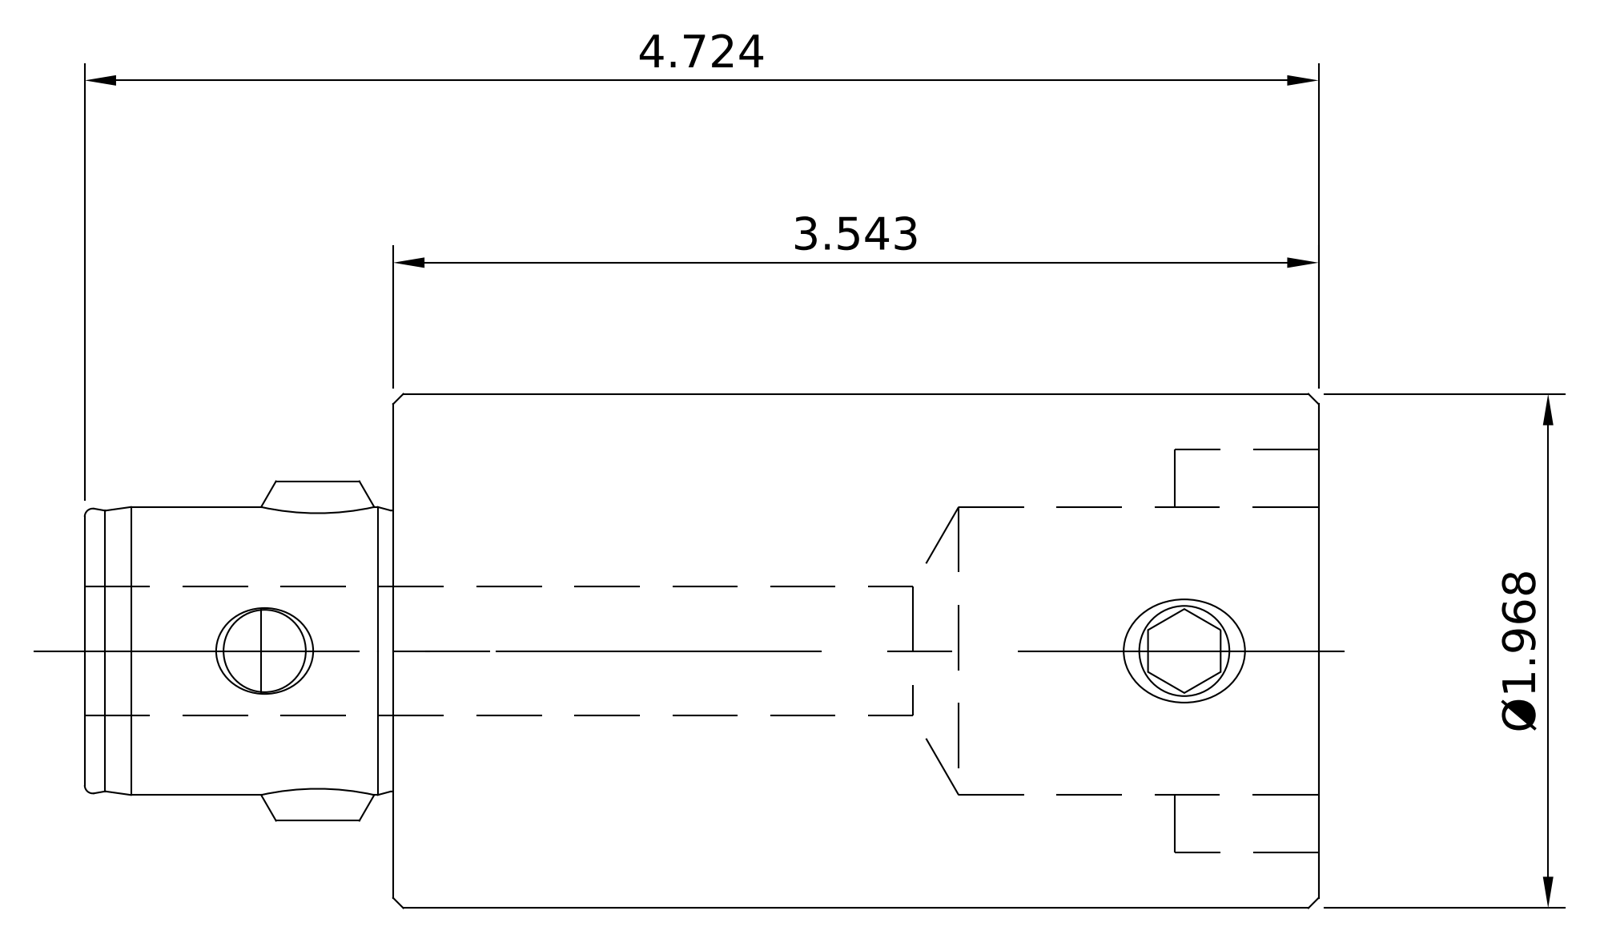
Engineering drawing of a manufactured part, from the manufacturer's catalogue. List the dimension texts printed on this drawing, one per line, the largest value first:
4.724
3.543
Ø1.968
